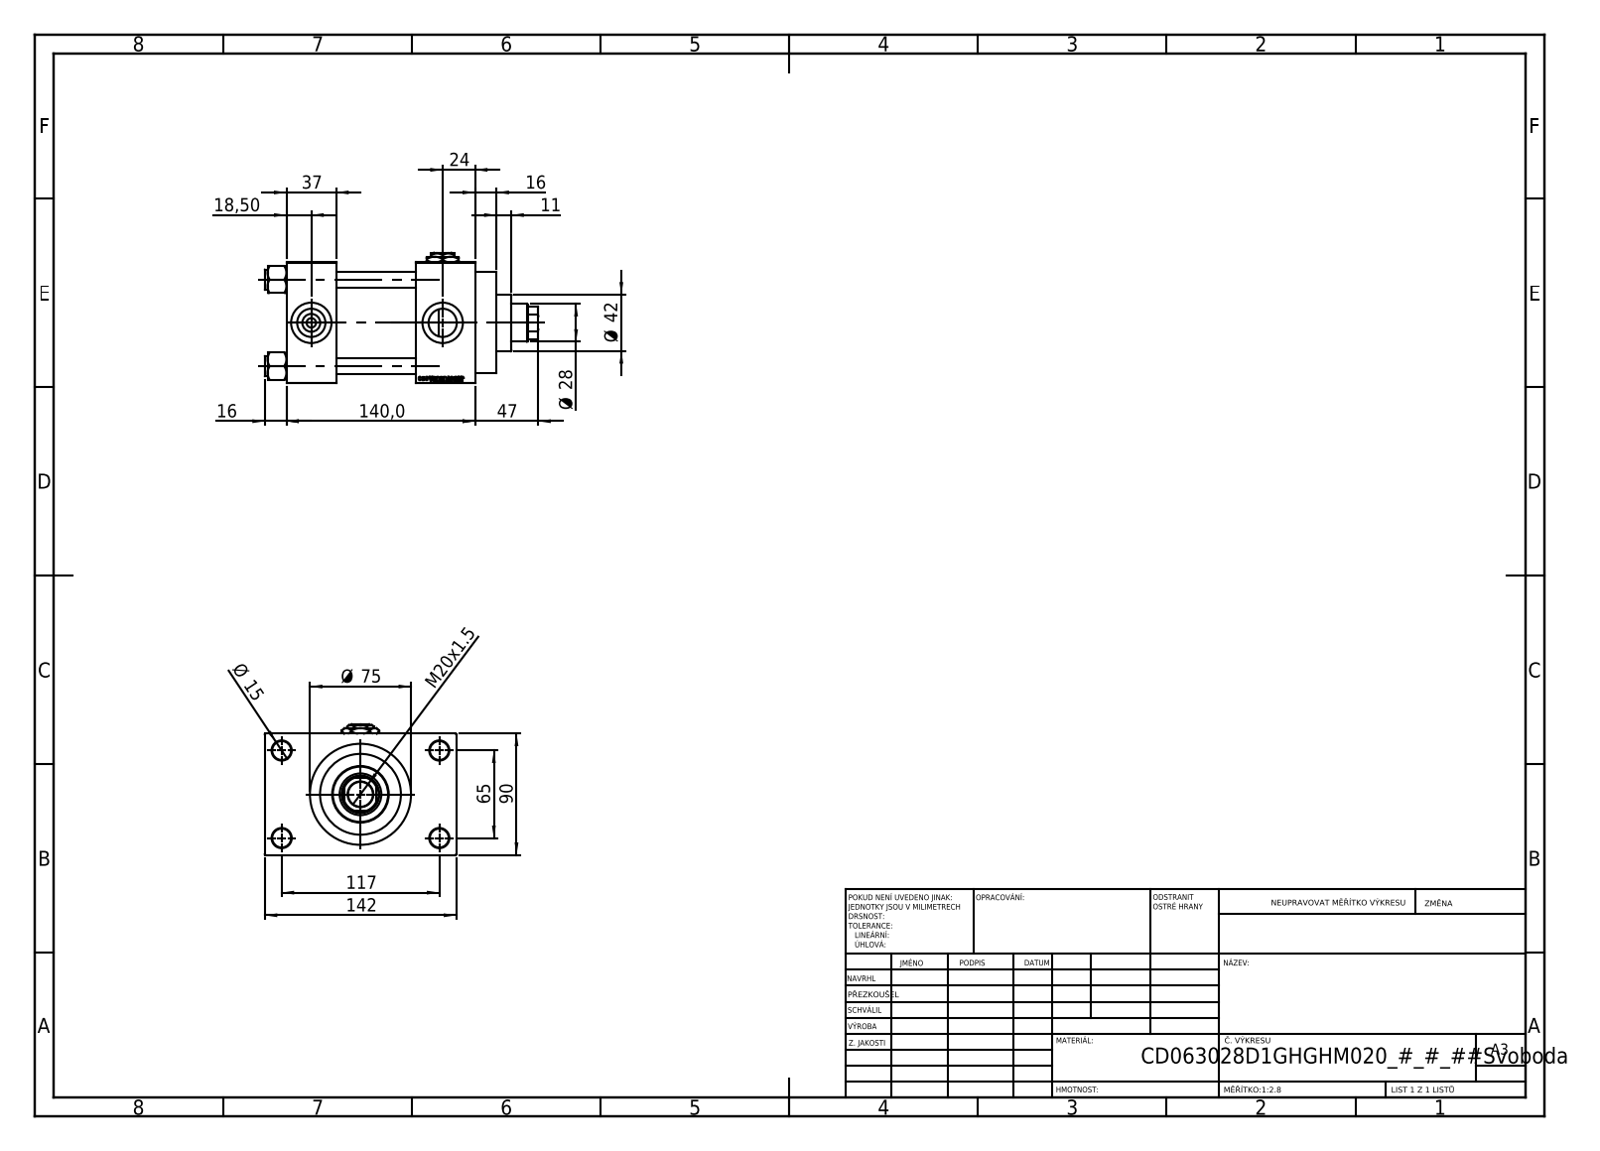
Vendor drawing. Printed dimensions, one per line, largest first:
142
140,0
117
90
Ø 75
65
47
Ø 42
37
Ø 28
24
M20x1.5
18,50
16
16
Ø 15
11
